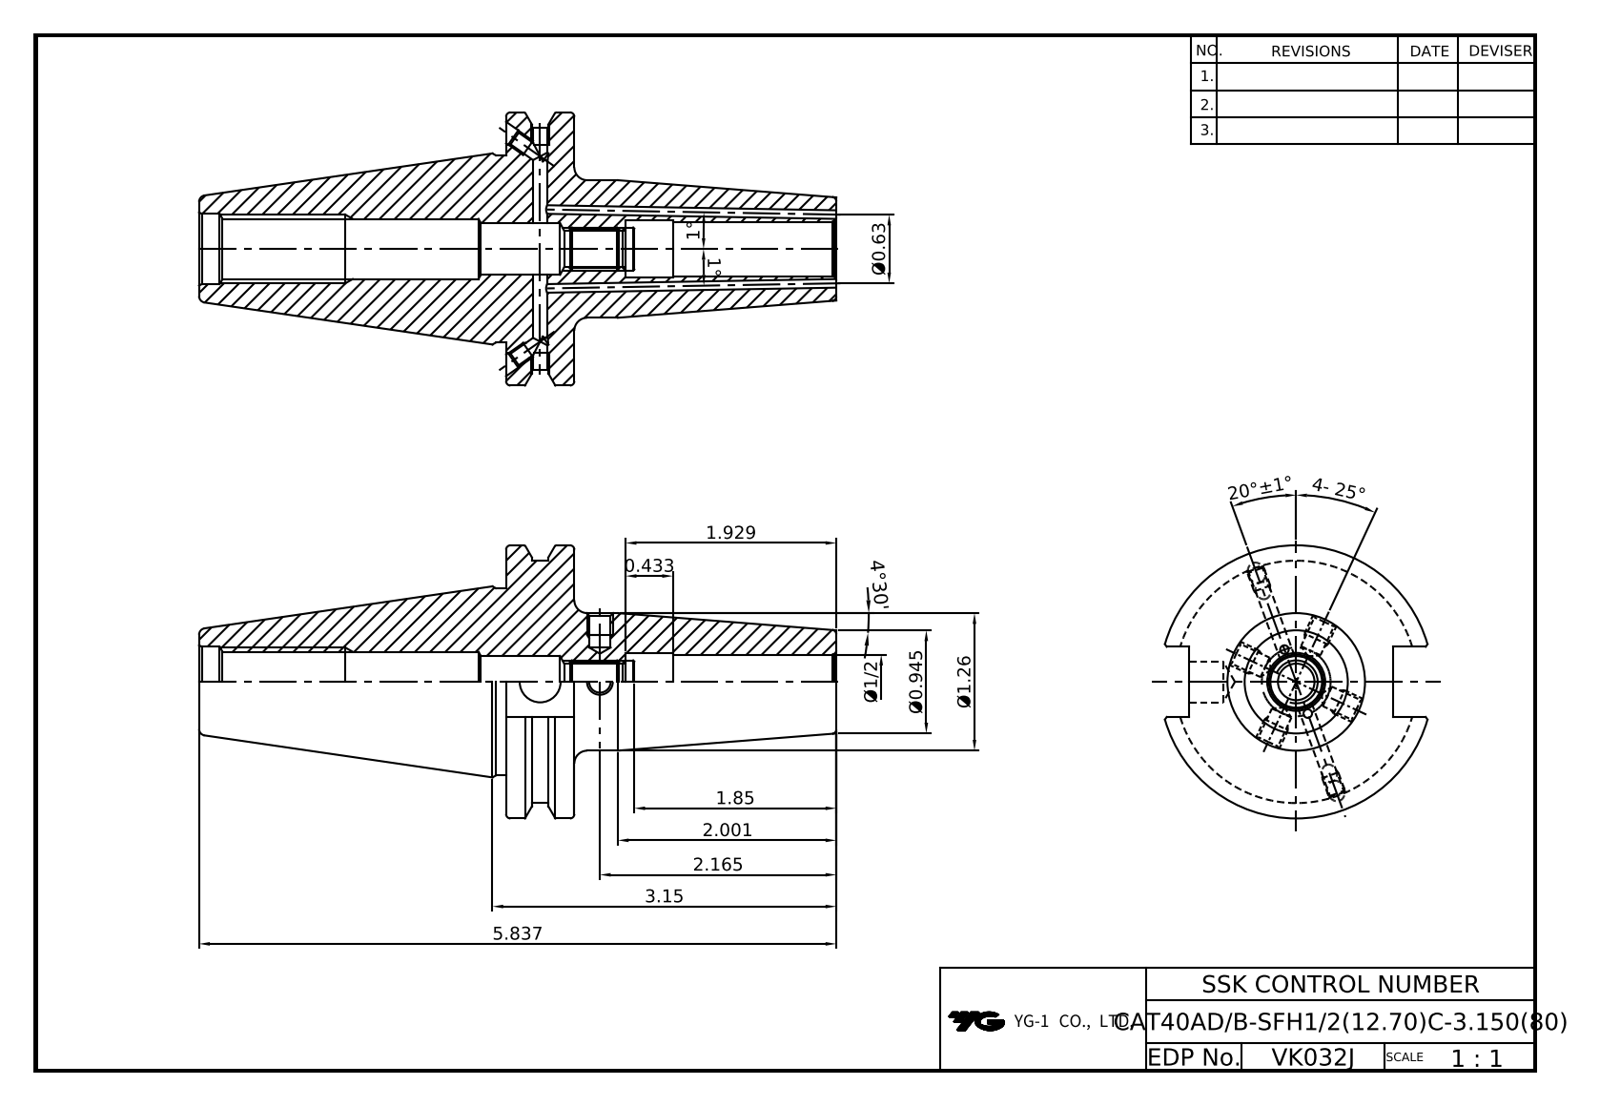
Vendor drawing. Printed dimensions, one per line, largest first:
20°±1°
5.837
4°30'
4- 25°
3.15
2.165
2.001
1.929
1.85
Ø1.26
1°
1°
Ø0.945
Ø0.63
0.433
